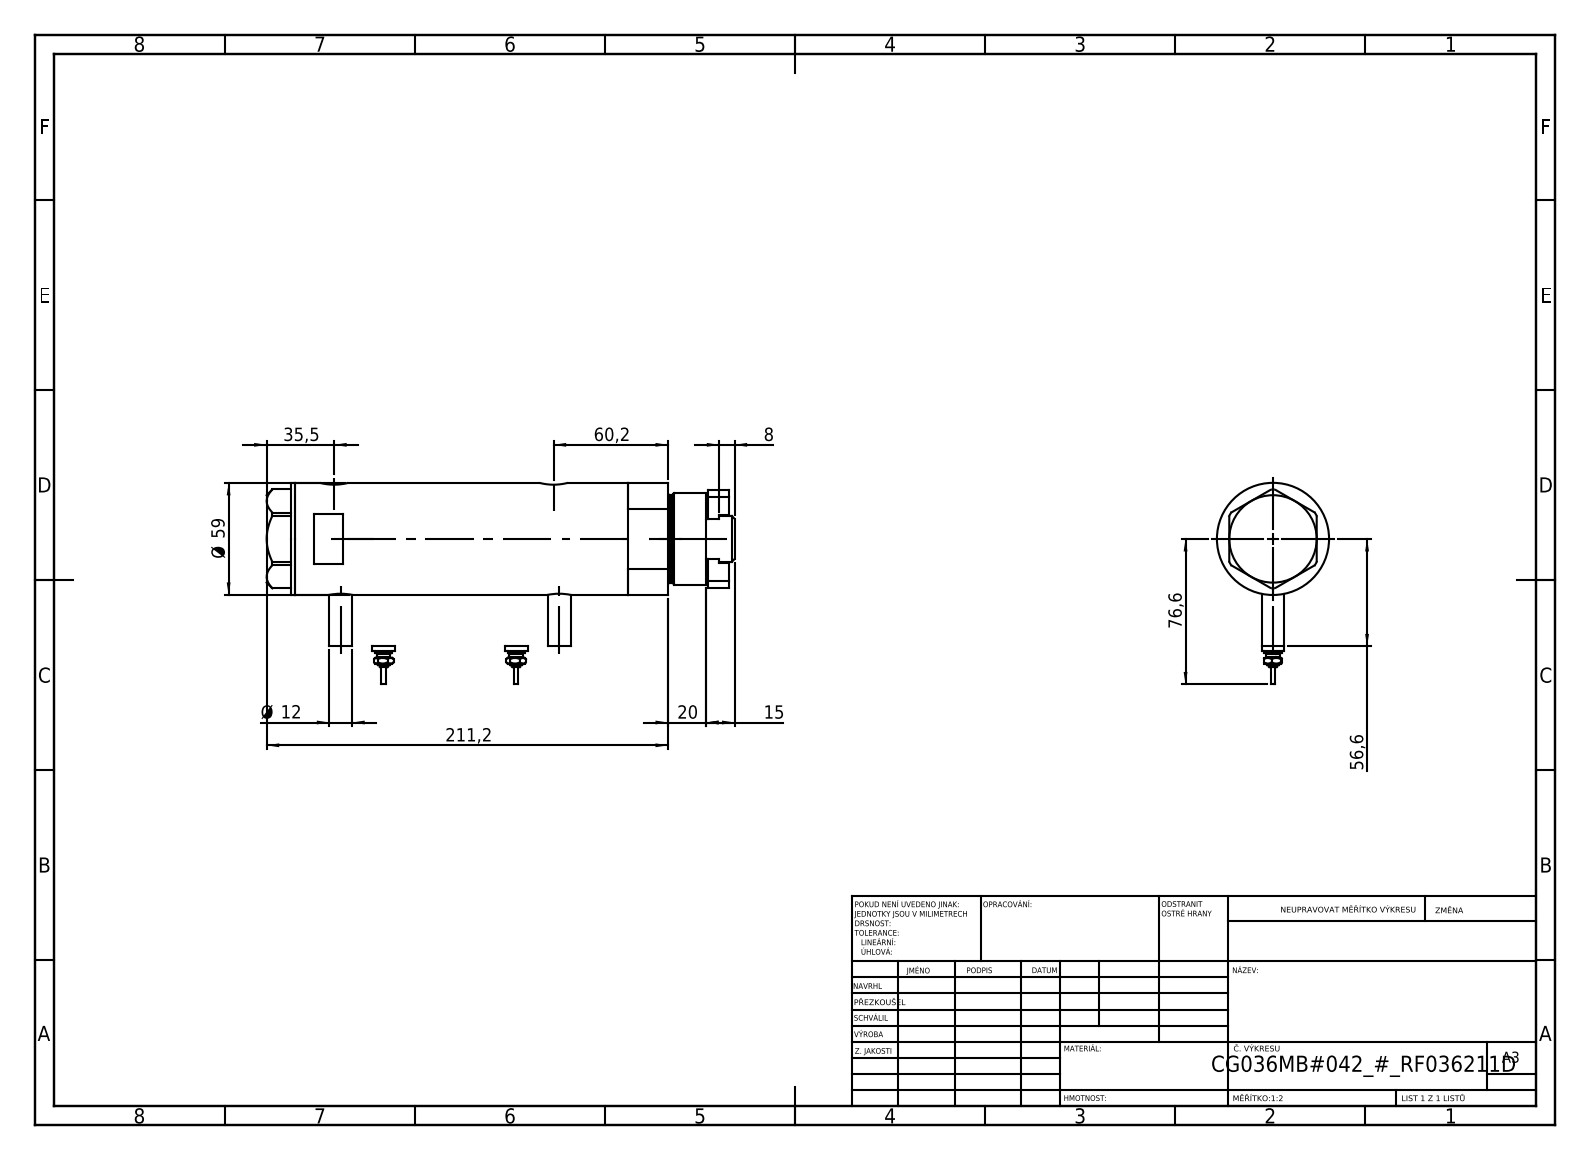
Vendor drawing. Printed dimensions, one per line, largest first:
211,2
76,6
60,2
Ø 59
56,6
35,5
20
15
Ø 12
8
